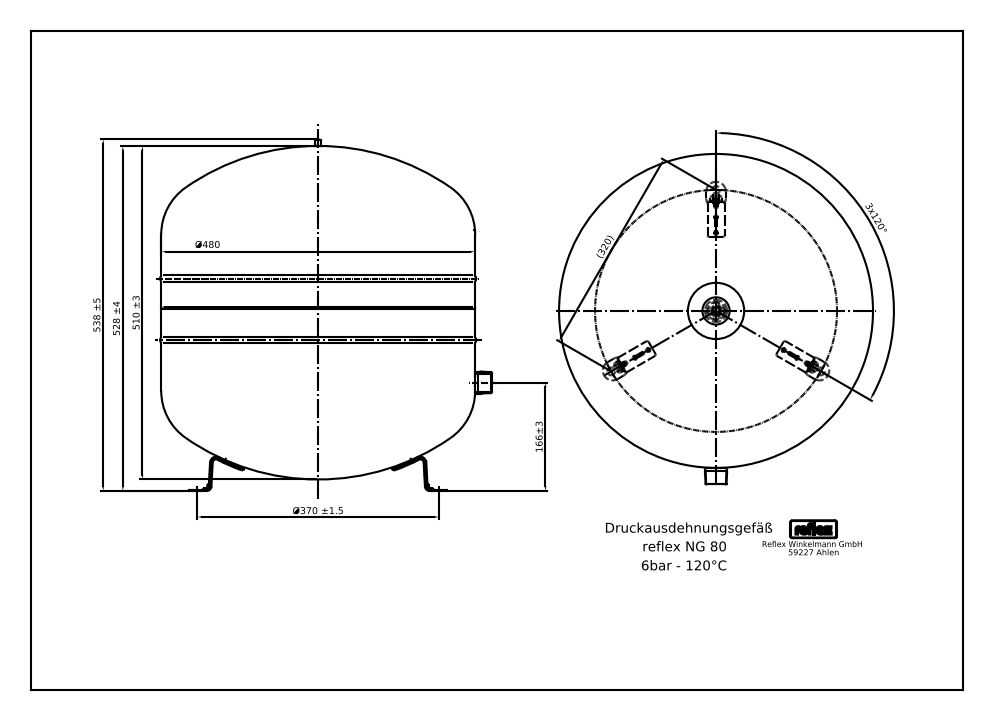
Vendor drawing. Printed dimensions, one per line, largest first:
538 ±5
528 ±4
510 ±3
Ø480
Ø370 ±1.5
(320)
166±3
3x120°
